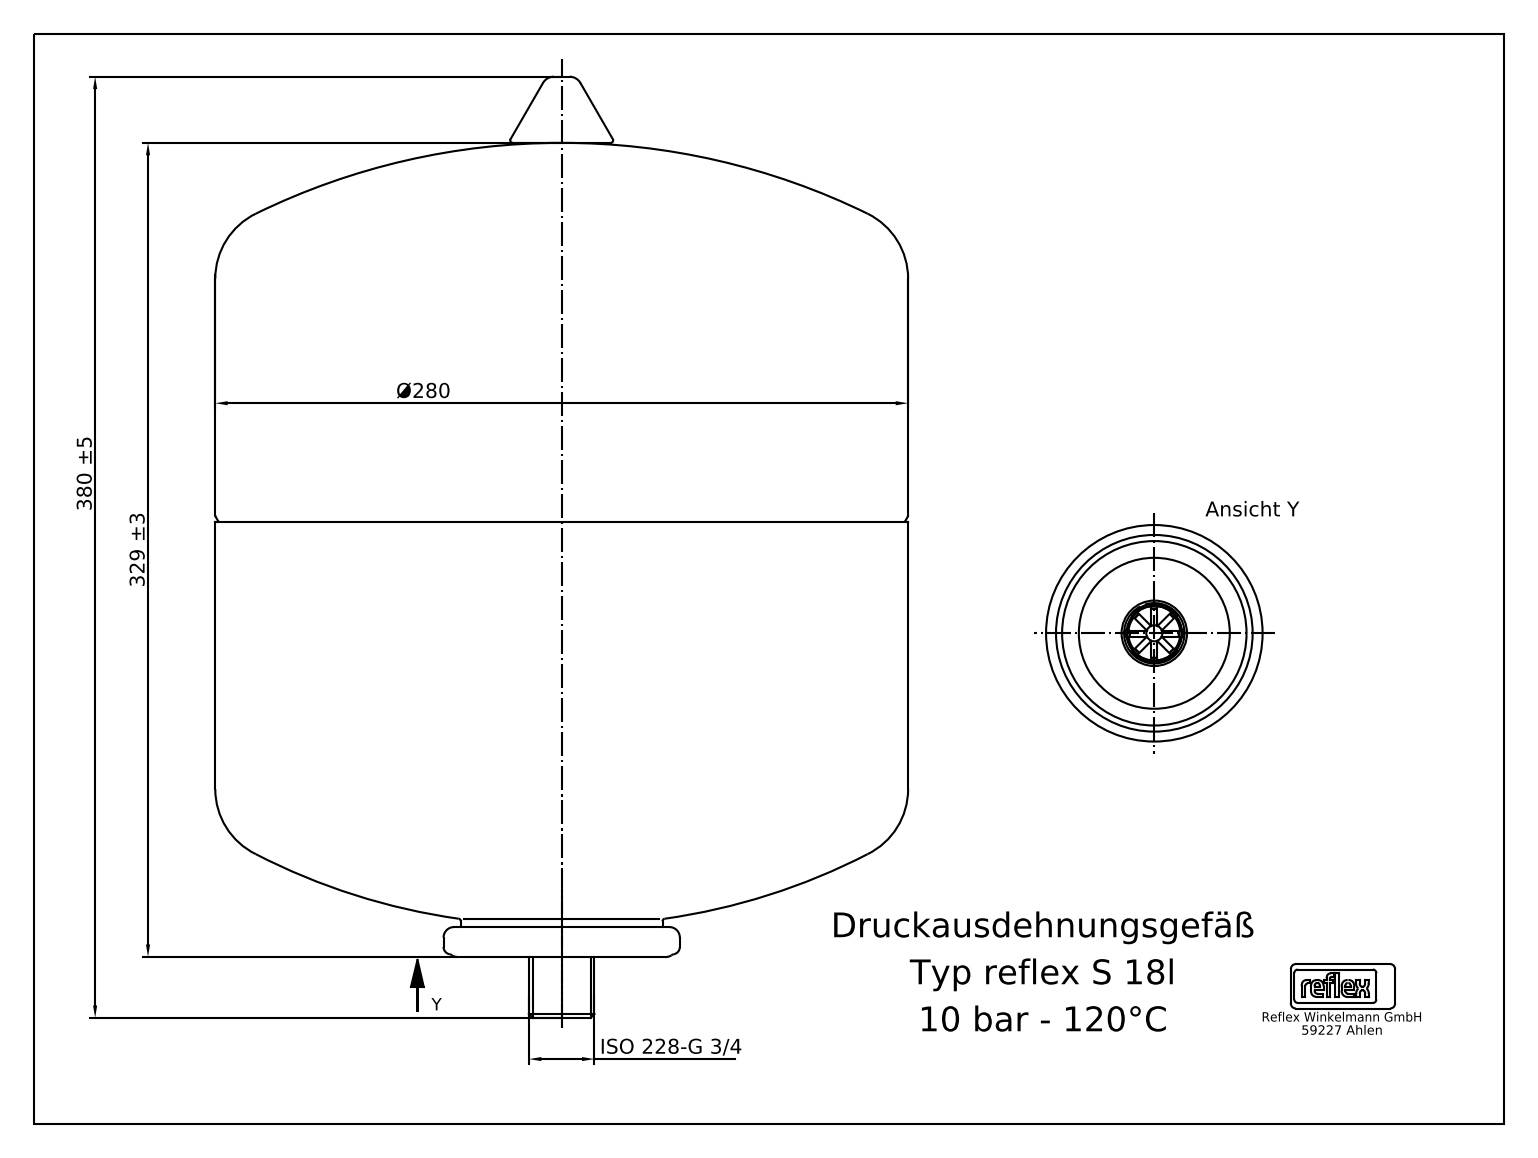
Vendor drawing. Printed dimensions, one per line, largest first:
380 ±5
329 ±3
Ø280
ISO 228-G 3/4
